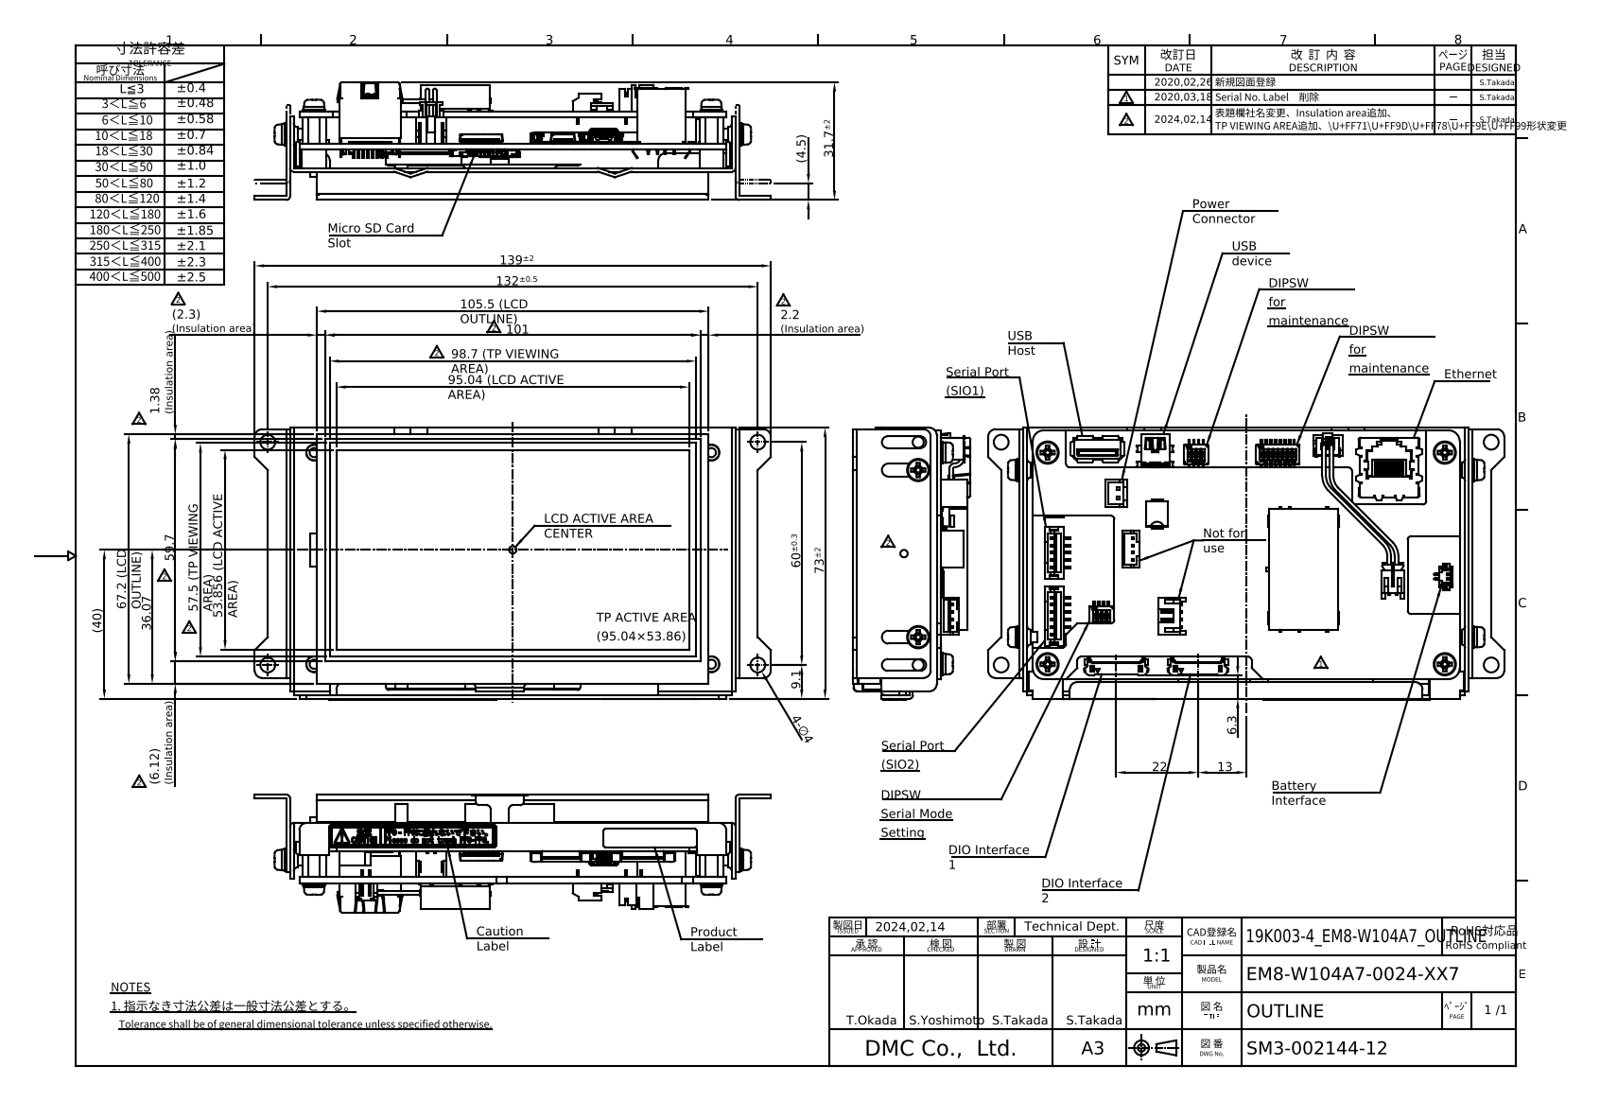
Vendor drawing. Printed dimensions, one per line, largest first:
139±2
132±0.5
105.5 (LCD OUTLINE)
101
98.7 (TP VIEWING AREA)
95.04 (LCD ACTIVE AREA)
73±2
67.2 (LCD OUTLINE)
60±0.3
59.7
57.5 (TP VIEWING AREA)
53.856 (LCD ACTIVE AREA)
(40)
36.07
31.7±2
22
13
9.1
6.3
(6.12) (Insulation area)
(4.5)
4-∅4
(2.3) (Insulation area)
2.2 (Insulation area)
1.38 (Insulation area)
